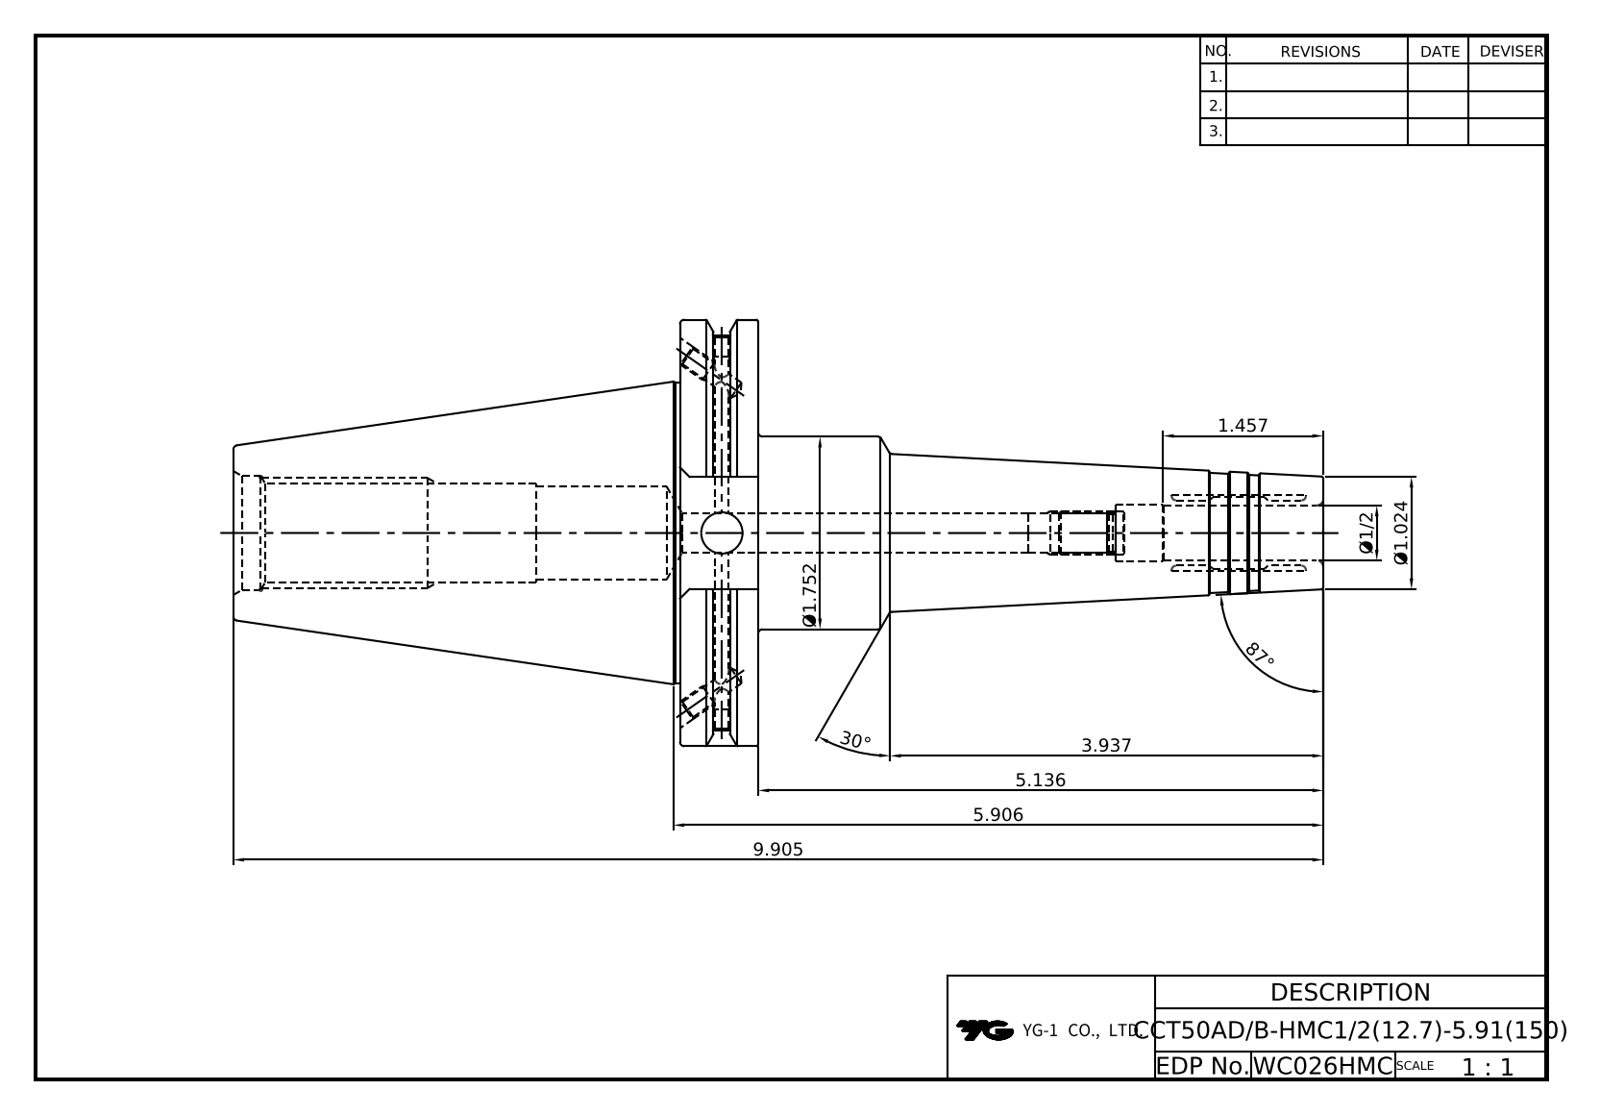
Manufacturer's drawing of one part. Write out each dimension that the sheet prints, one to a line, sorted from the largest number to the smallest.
87°
30°
9.905
5.906
5.136
3.937
Ø1.752
1.457
Ø1.024
Ø1/2
